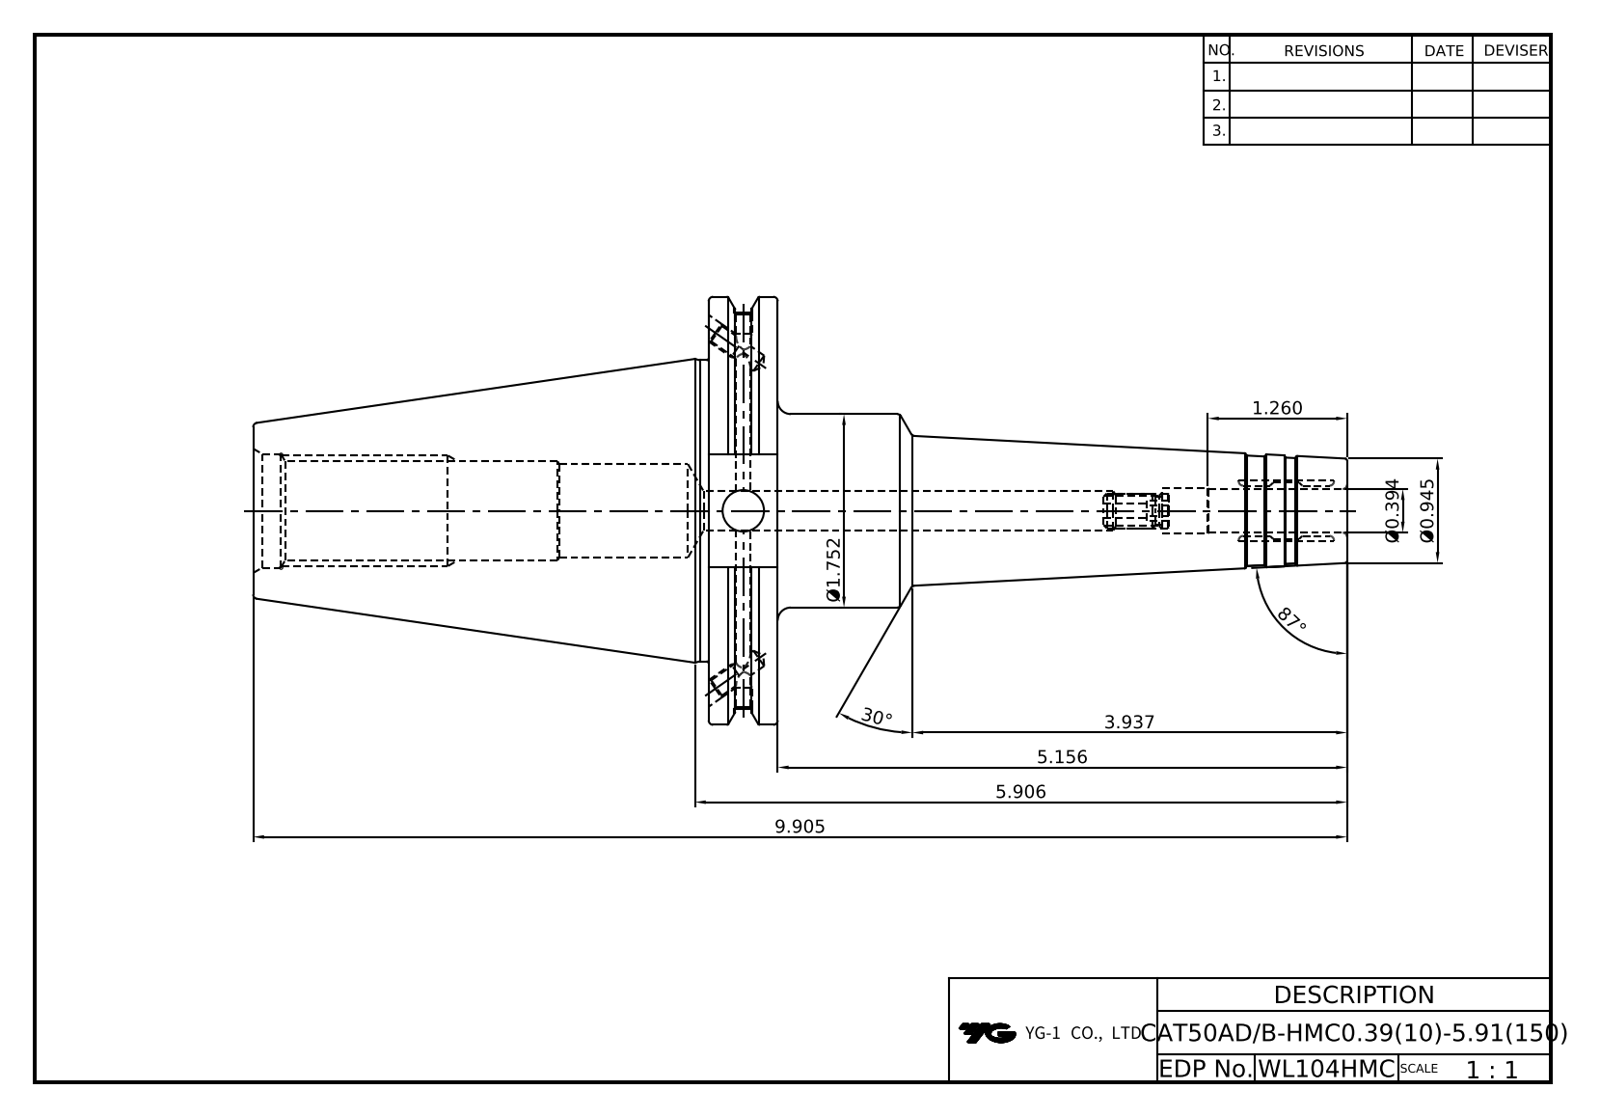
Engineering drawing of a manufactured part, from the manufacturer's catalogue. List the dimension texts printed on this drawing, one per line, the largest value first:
87°
30°
9.905
5.906
5.156
3.937
Ø1.752
1.260
Ø0.945
Ø0.394
